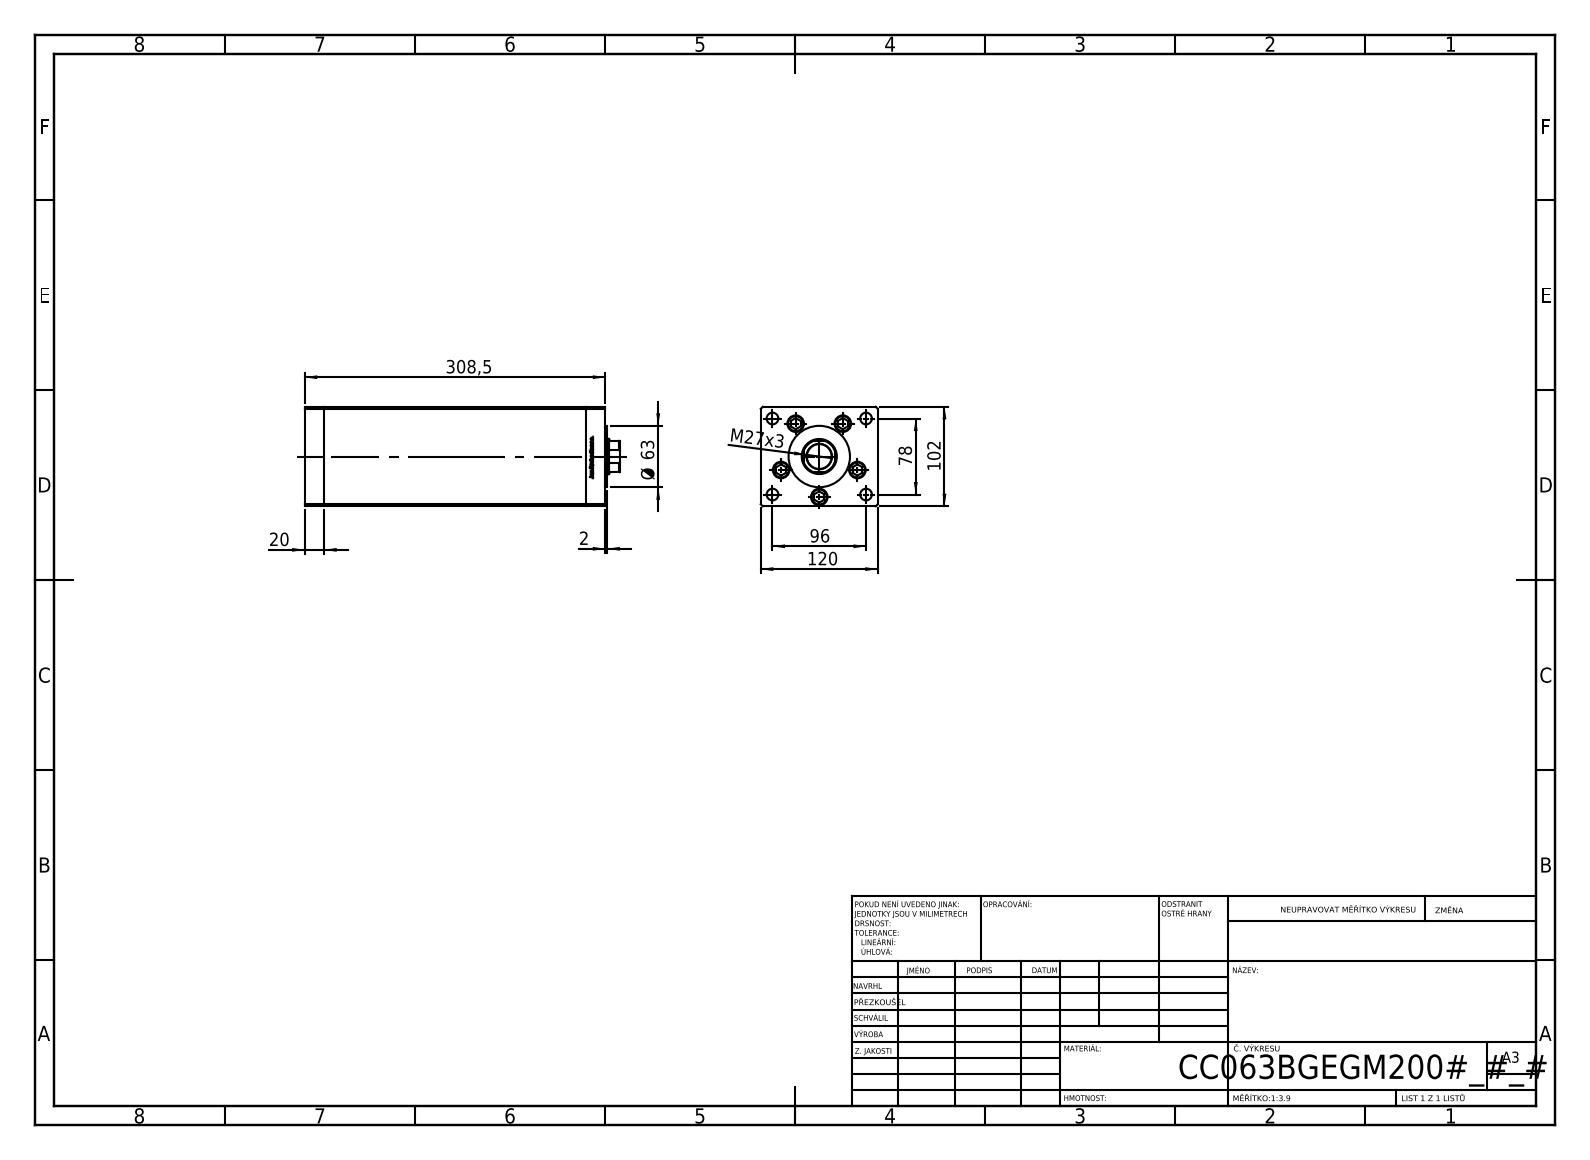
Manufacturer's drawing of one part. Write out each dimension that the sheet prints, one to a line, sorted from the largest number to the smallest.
308,5
120
102
96
78
Ø 63
M27x3
20
2
